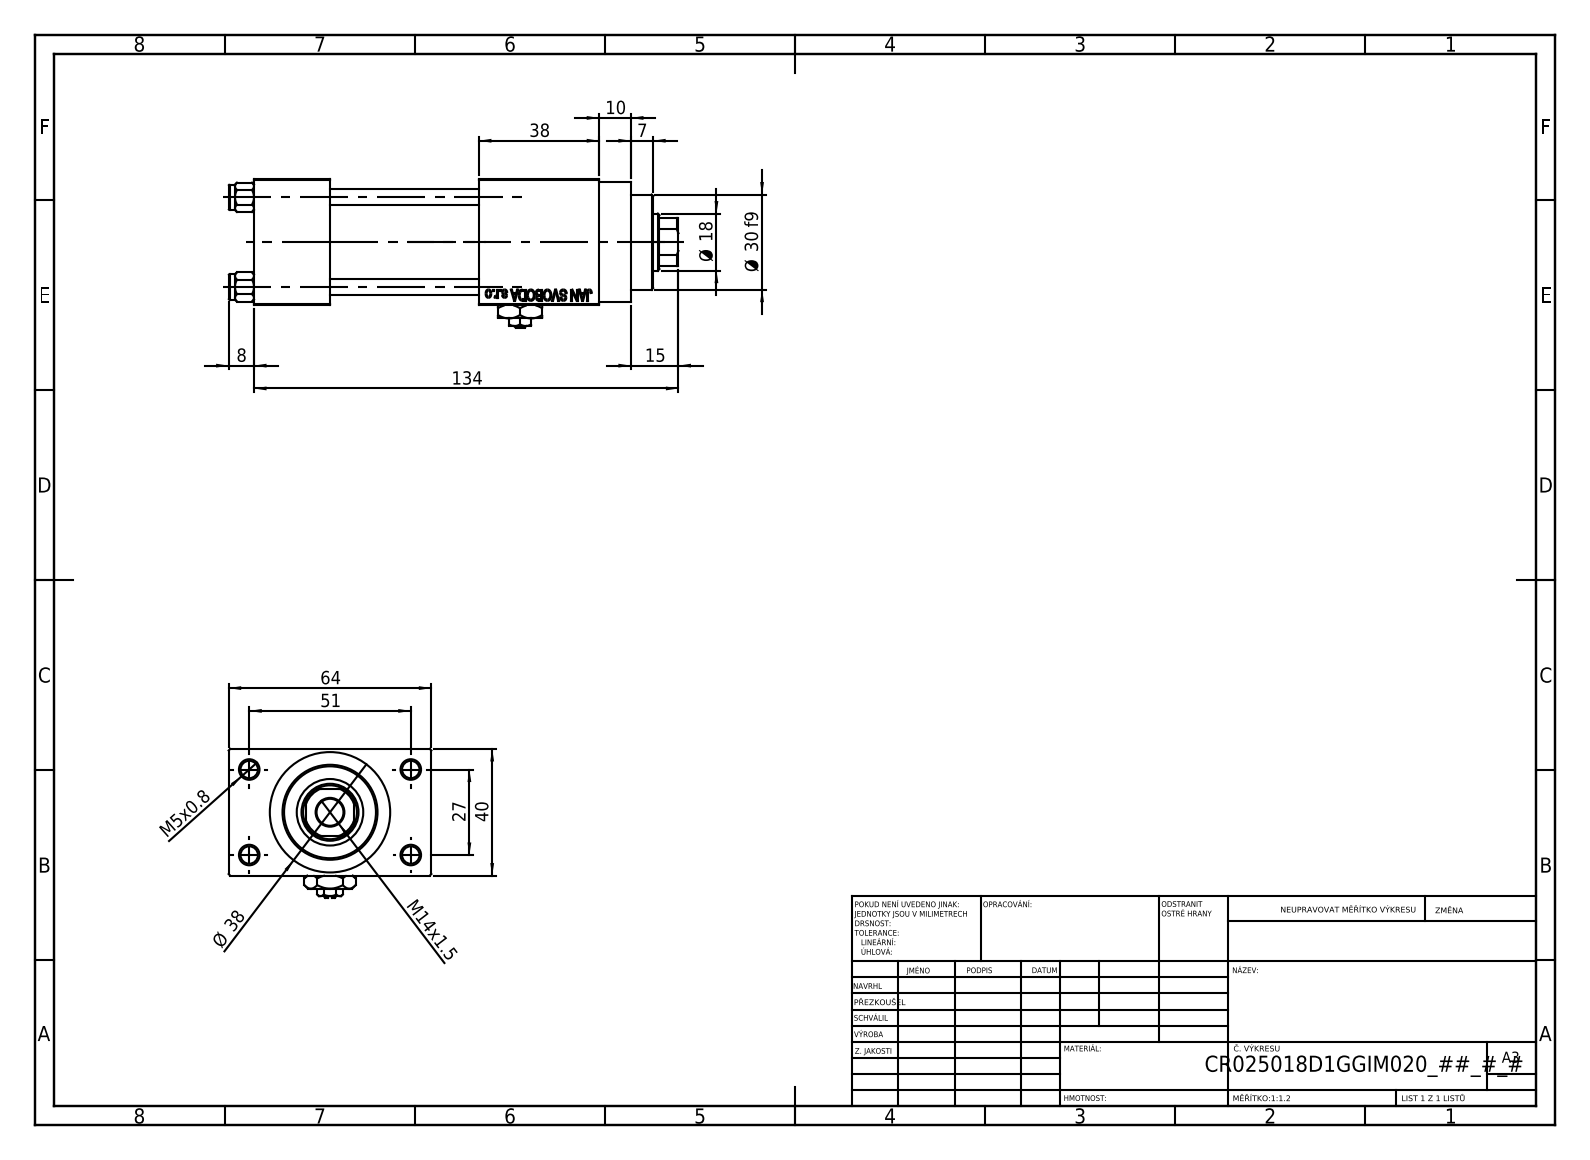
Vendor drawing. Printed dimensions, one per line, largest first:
134
64
51
40
38
Ø 38
Ø 30 f9
27
Ø 18
15
M14x1.5
10
8
7
M5x0.8
